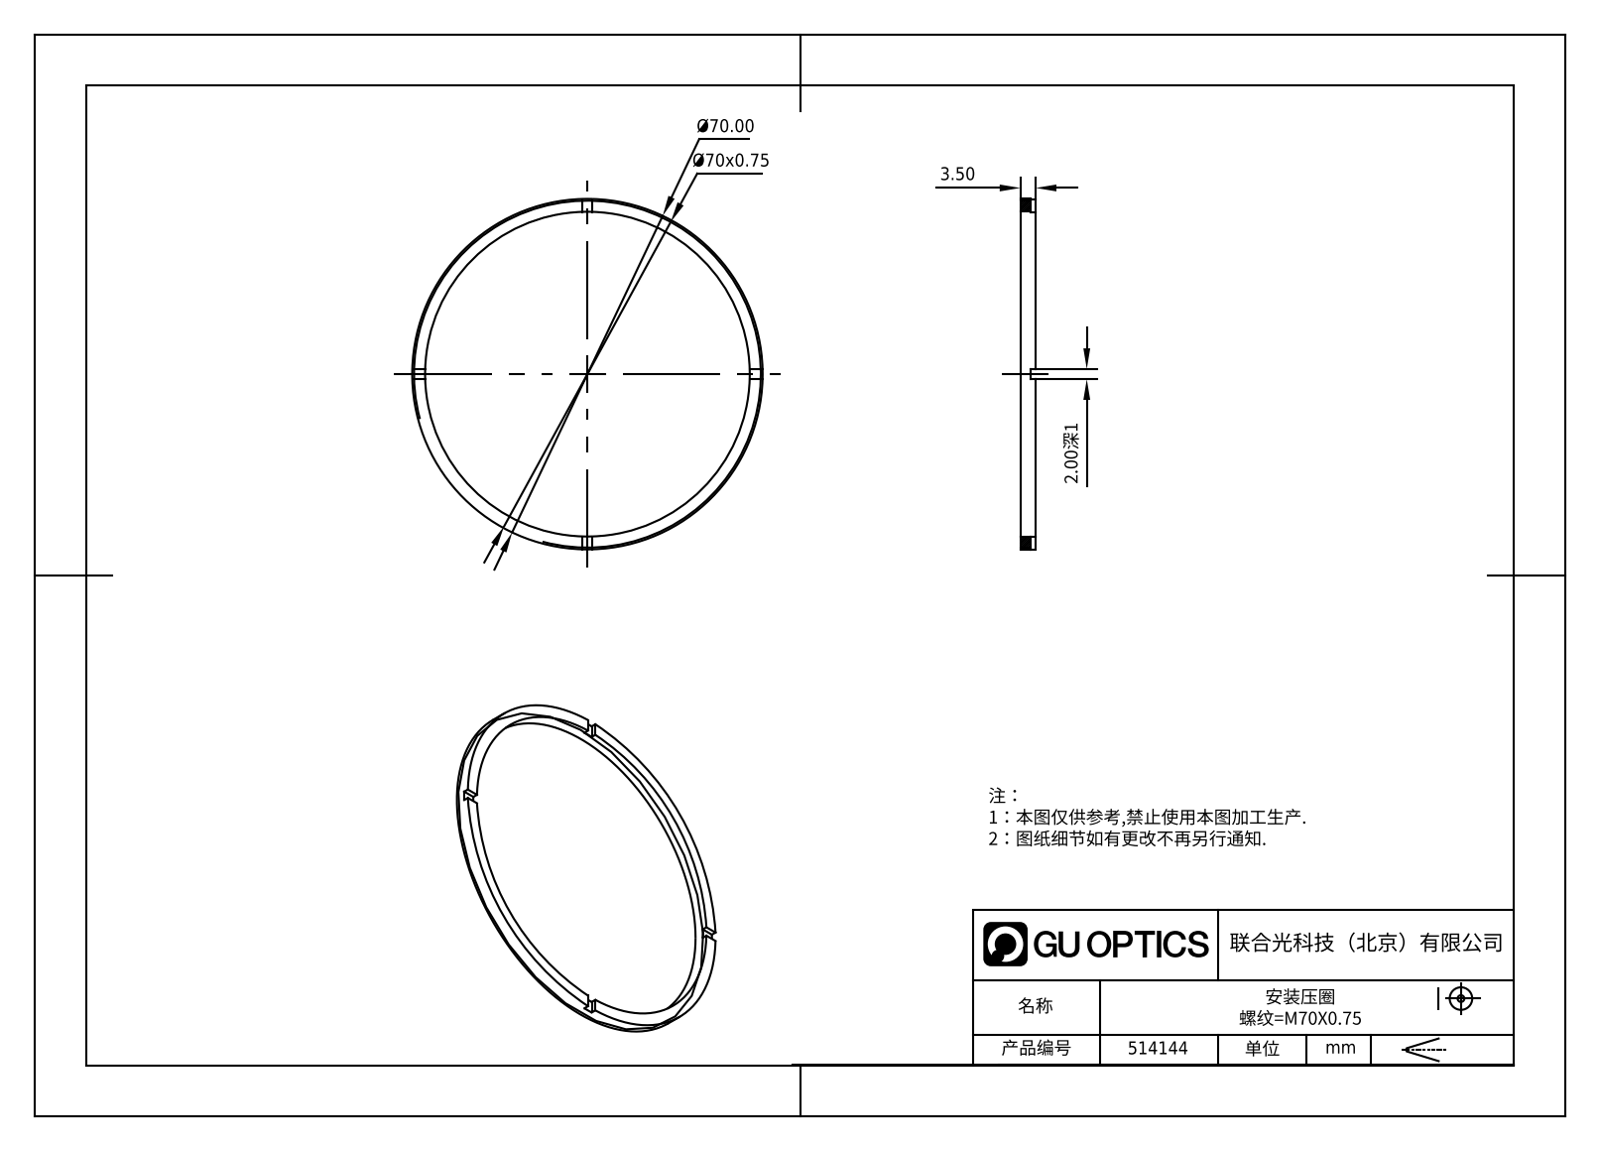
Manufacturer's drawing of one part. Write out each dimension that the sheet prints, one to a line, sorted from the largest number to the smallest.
Ø70.00
Ø70x0.75
3.50
2.00深1
